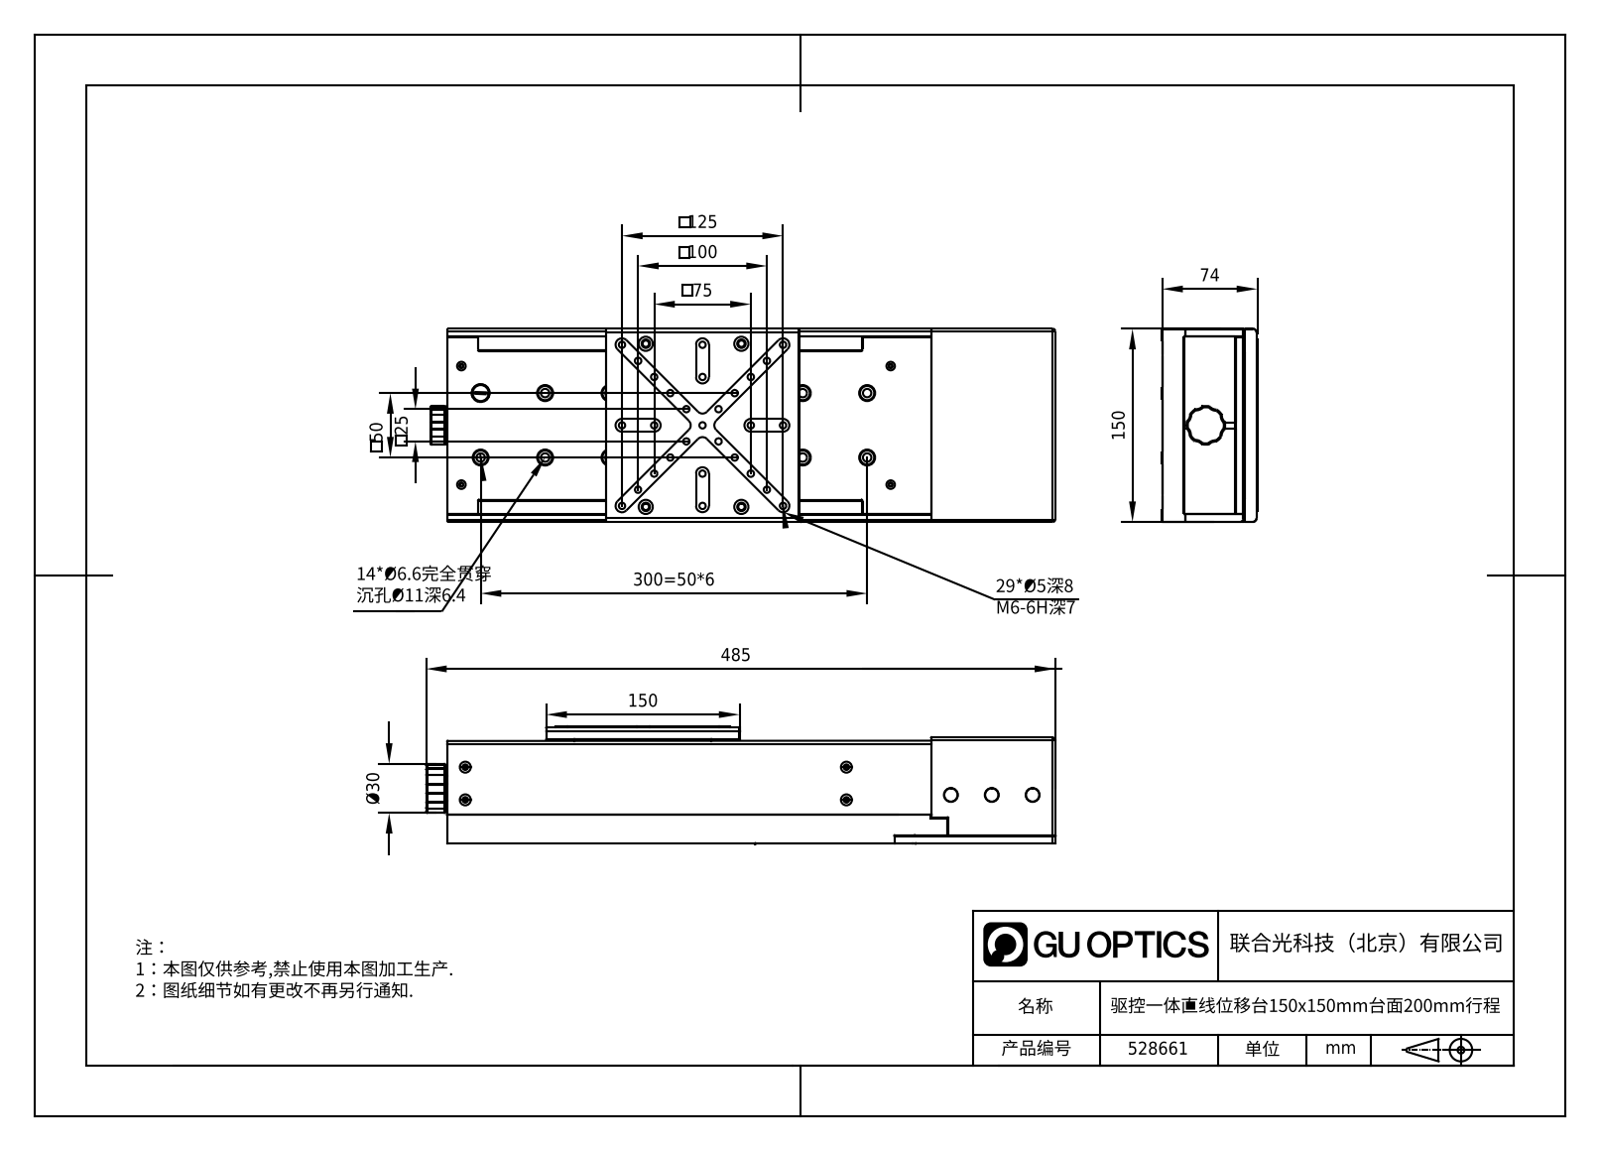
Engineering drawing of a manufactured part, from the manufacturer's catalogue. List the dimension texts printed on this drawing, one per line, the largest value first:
485
300=50*6
150
150
125
100
75
74
50
Ø30
25
